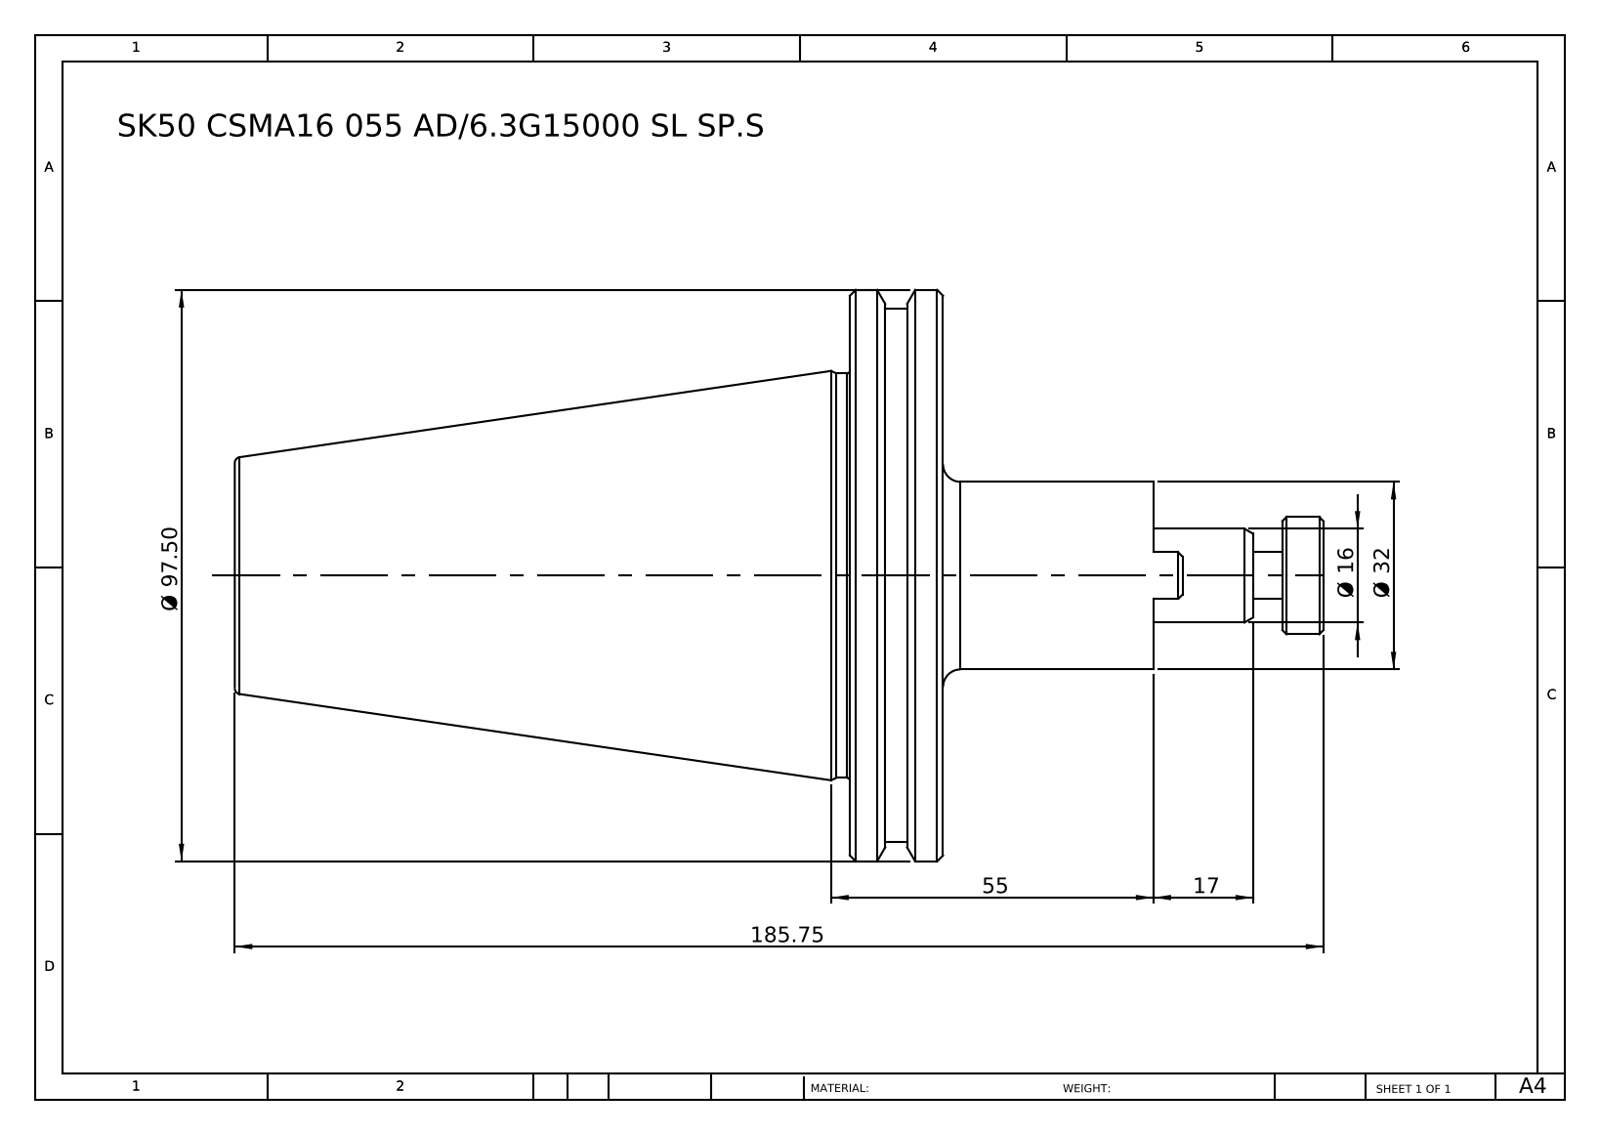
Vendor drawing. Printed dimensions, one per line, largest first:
185.75
Ø 97.50
55
Ø 32
17
Ø 16
